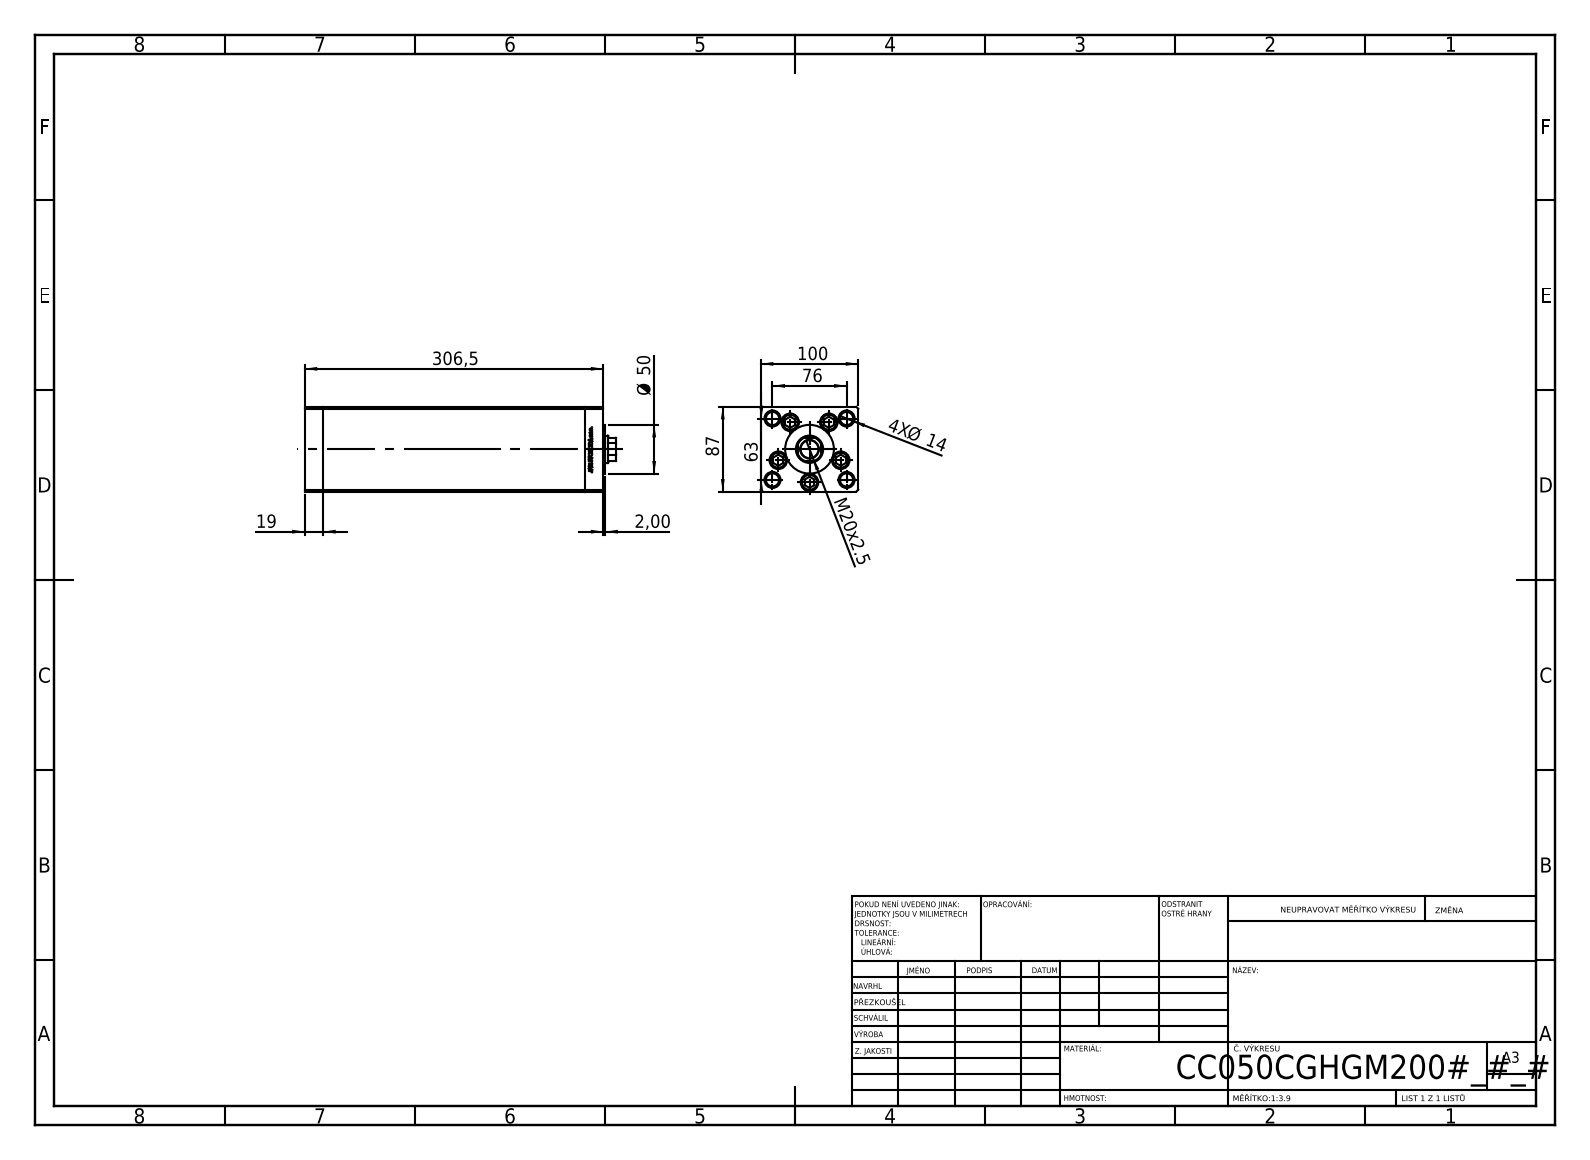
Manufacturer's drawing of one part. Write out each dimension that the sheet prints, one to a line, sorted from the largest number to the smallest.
306,5
100
87
76
63
Ø 50
M20x2.5
19
4X Ø 14
2,00
